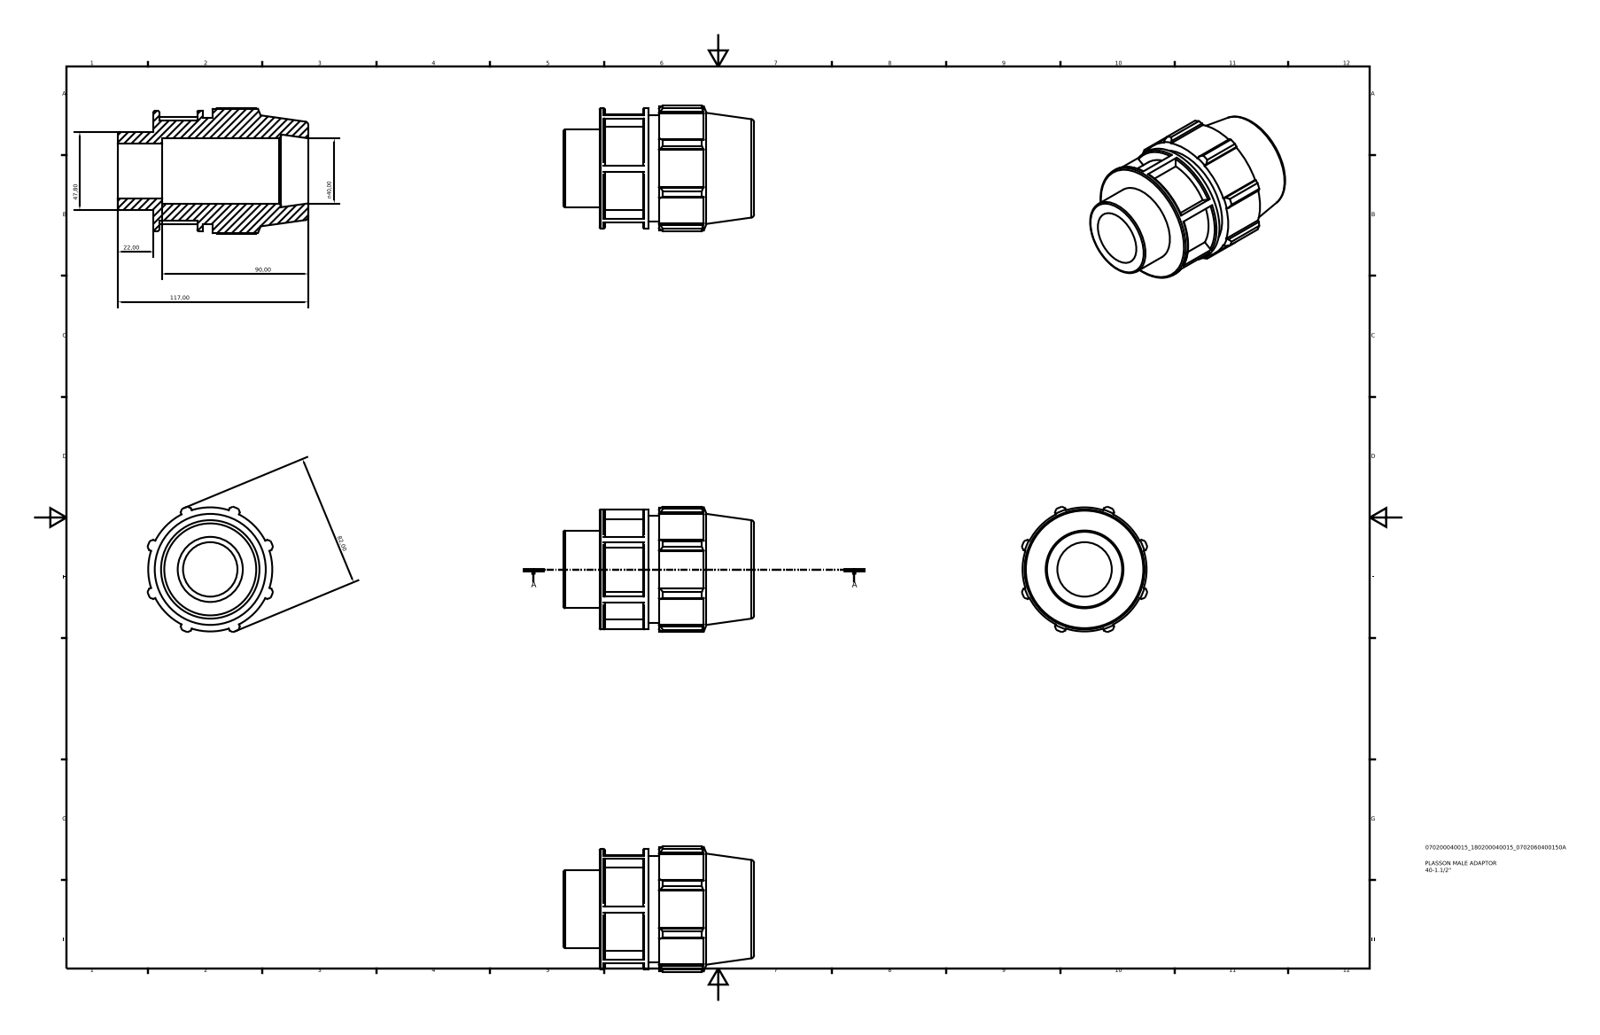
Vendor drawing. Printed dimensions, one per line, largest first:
117,00
90,00
82,00
47,80
n40,00
22,00
